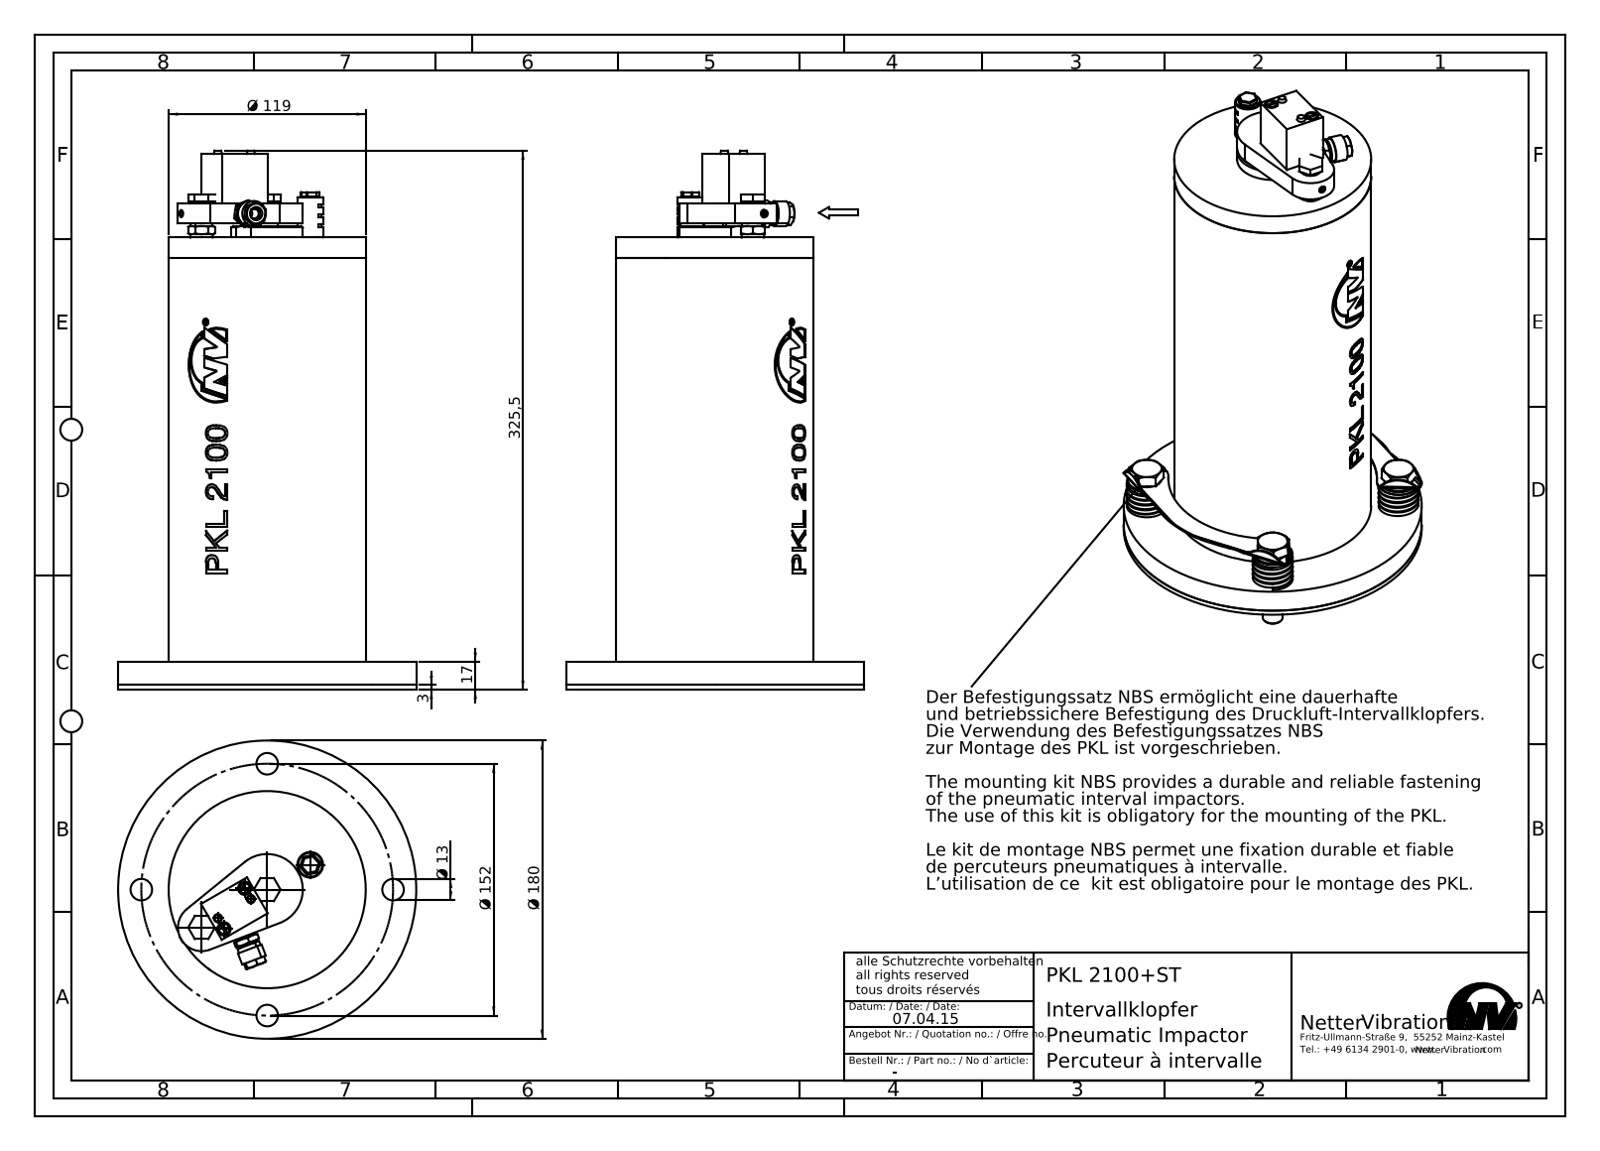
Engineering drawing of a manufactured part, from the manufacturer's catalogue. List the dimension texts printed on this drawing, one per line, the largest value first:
325,5
Ø 180
Ø 152
Ø 119
17
Ø 13
3
